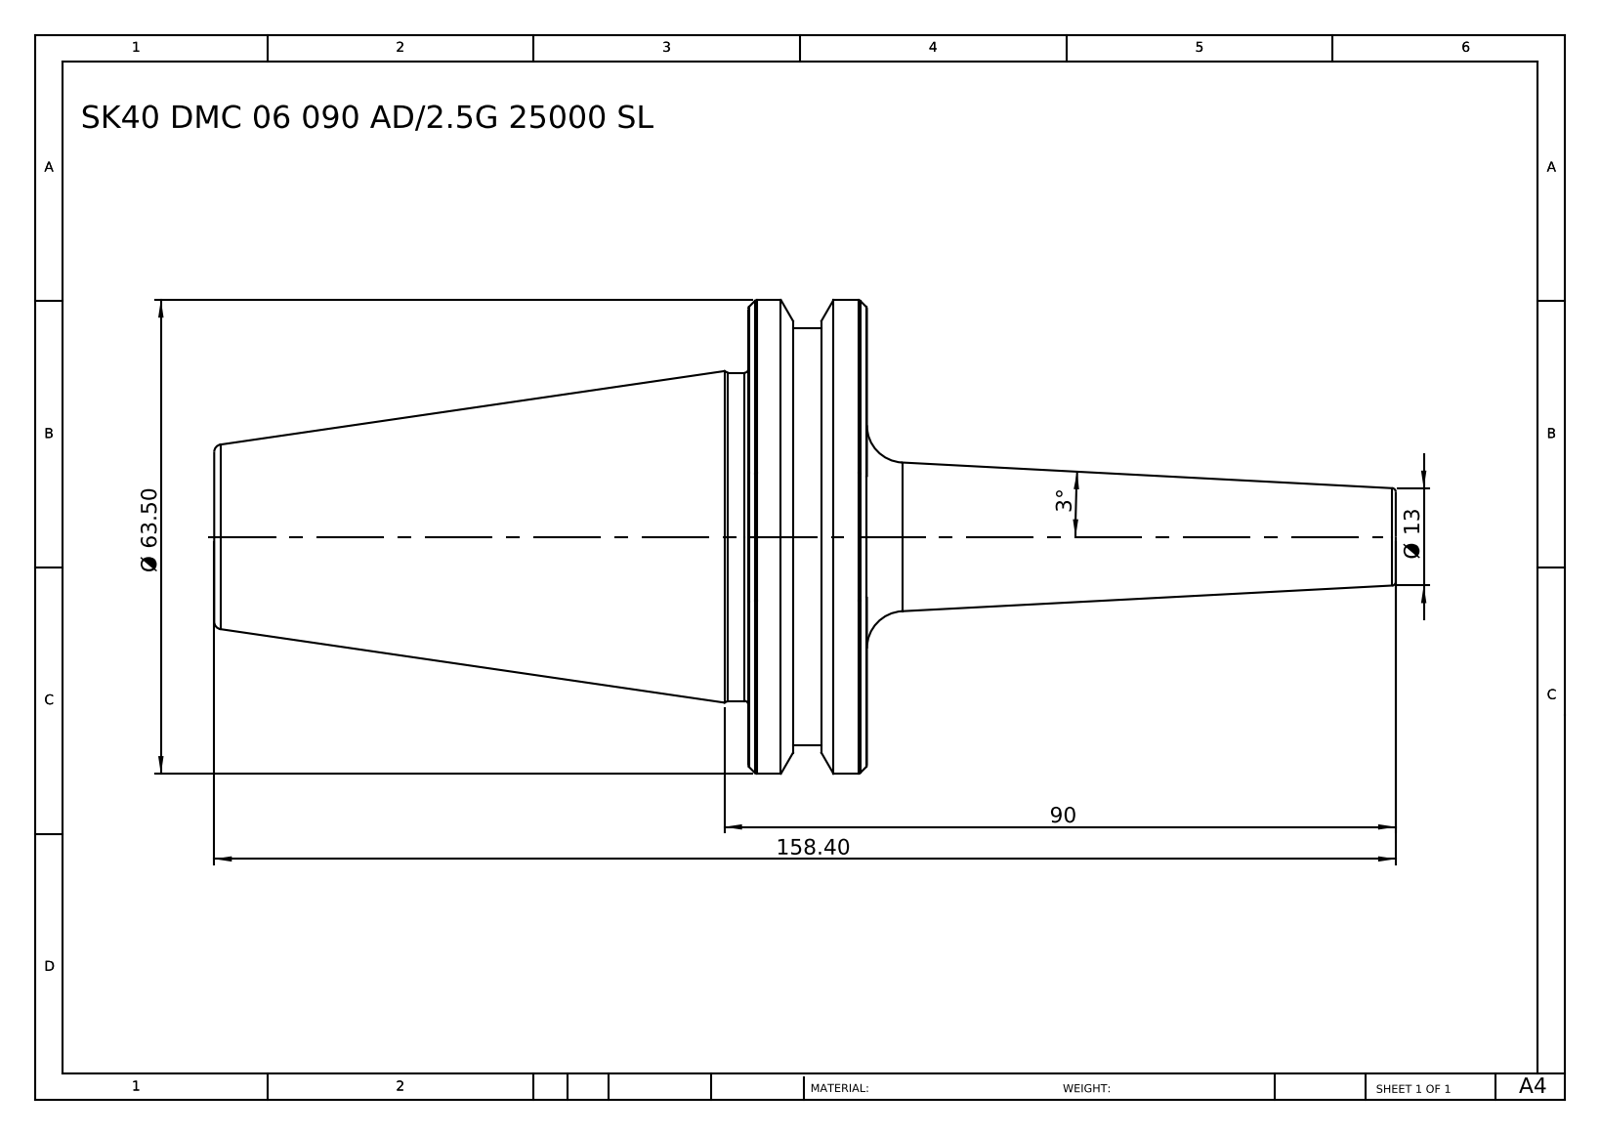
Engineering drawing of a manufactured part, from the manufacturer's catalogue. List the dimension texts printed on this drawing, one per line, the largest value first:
158.40
90
Ø 63.50
Ø 13
3°
